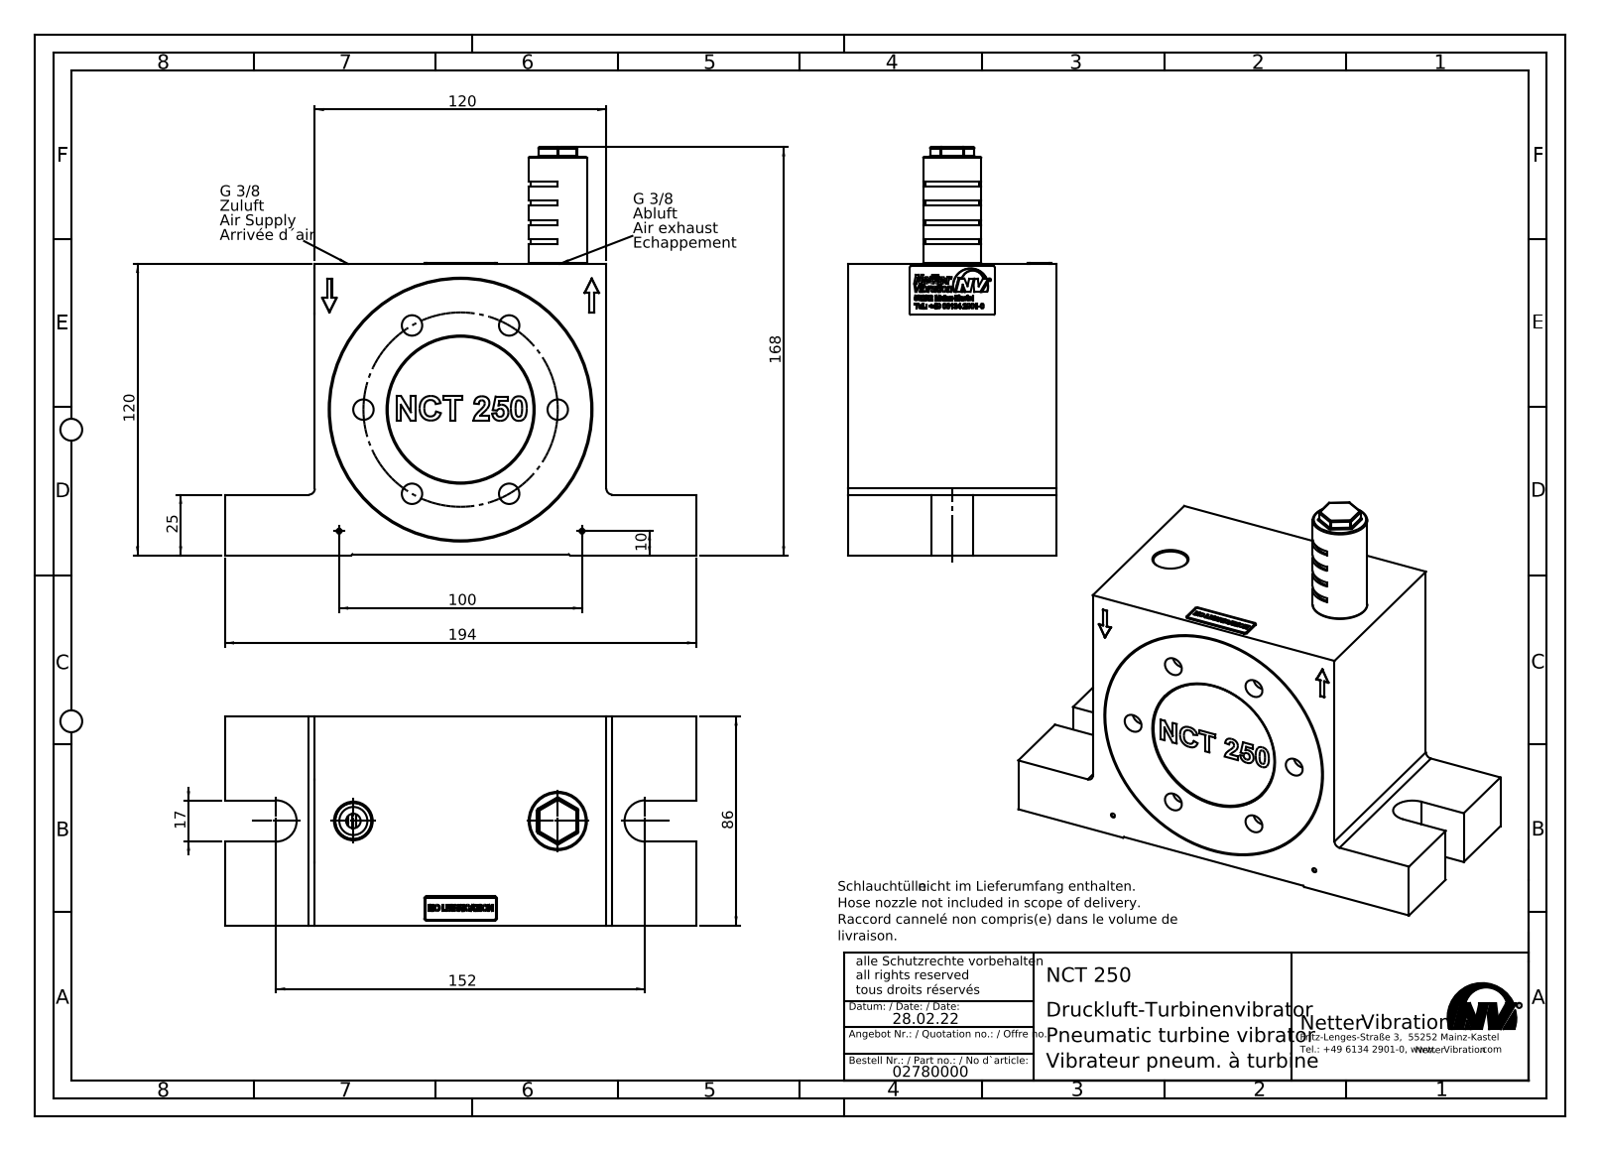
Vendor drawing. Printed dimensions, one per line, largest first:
194
168
152
120
120
100
86
25
17
10
